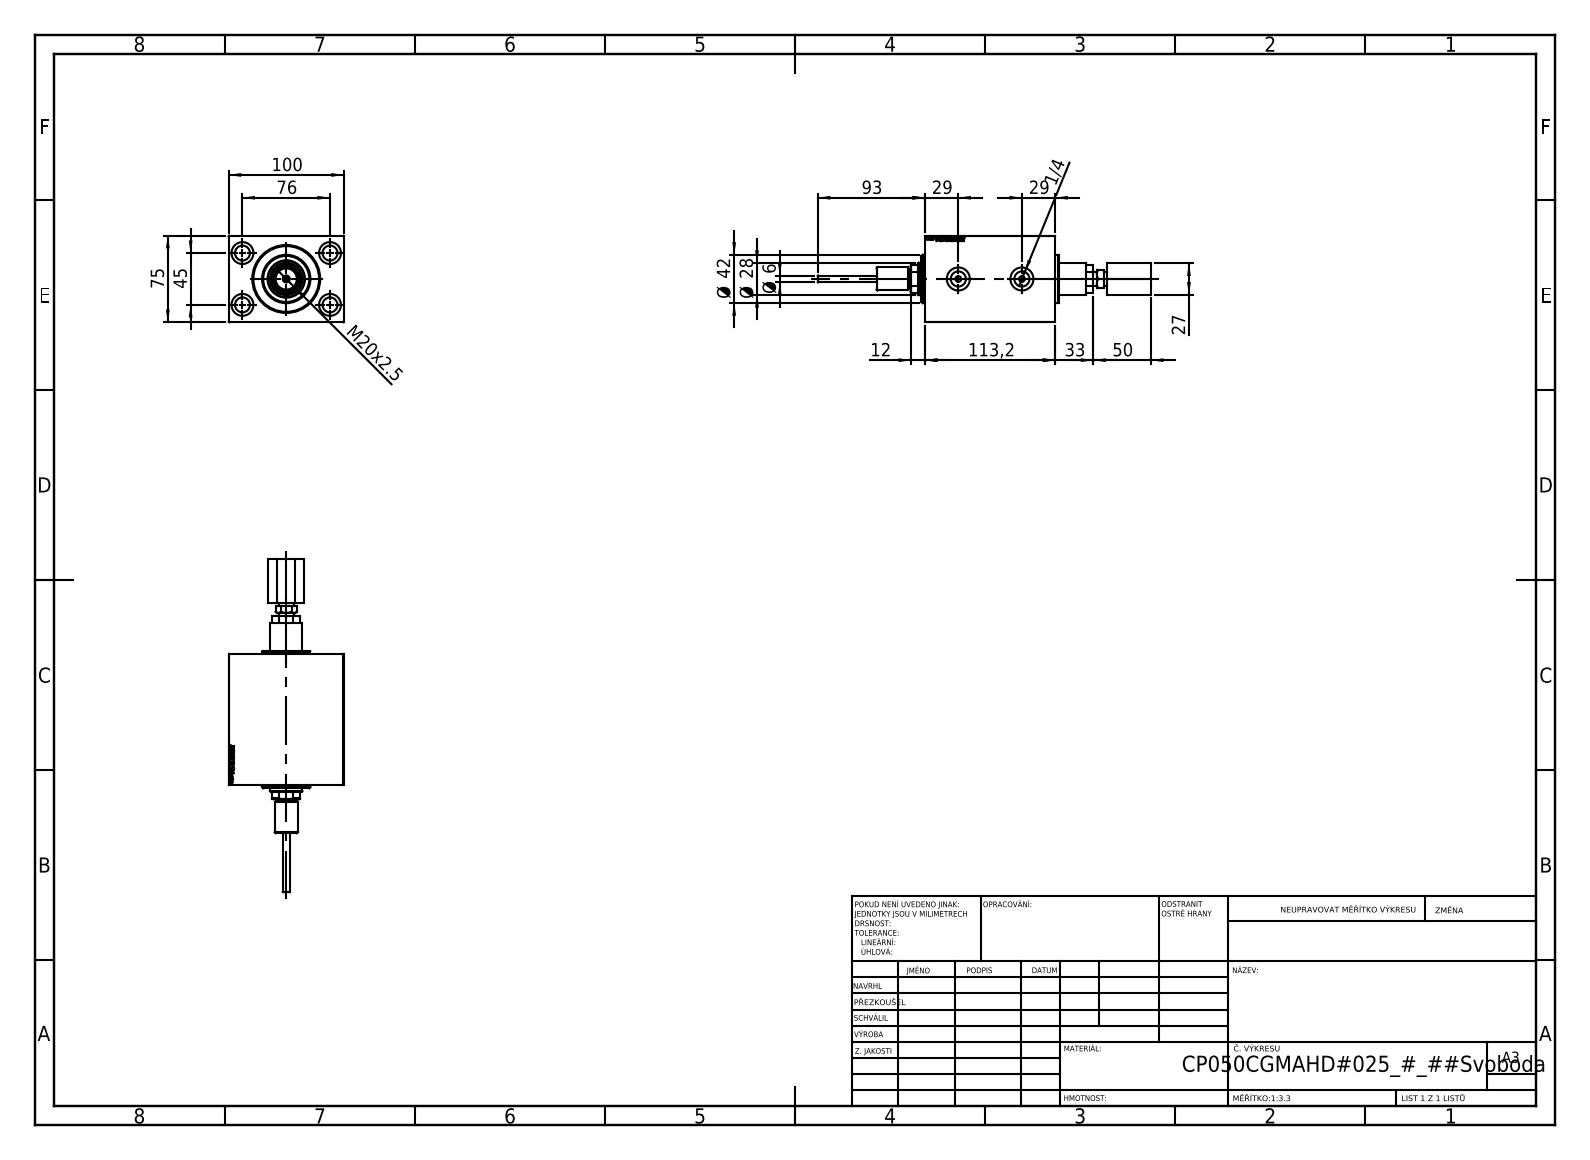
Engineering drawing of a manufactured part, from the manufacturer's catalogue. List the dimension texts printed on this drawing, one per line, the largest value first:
113,2
100
93
76
75
50
45
Ø 42
33
29
29
Ø 28
27
M20x2.5
12
Ø 6
1/4
